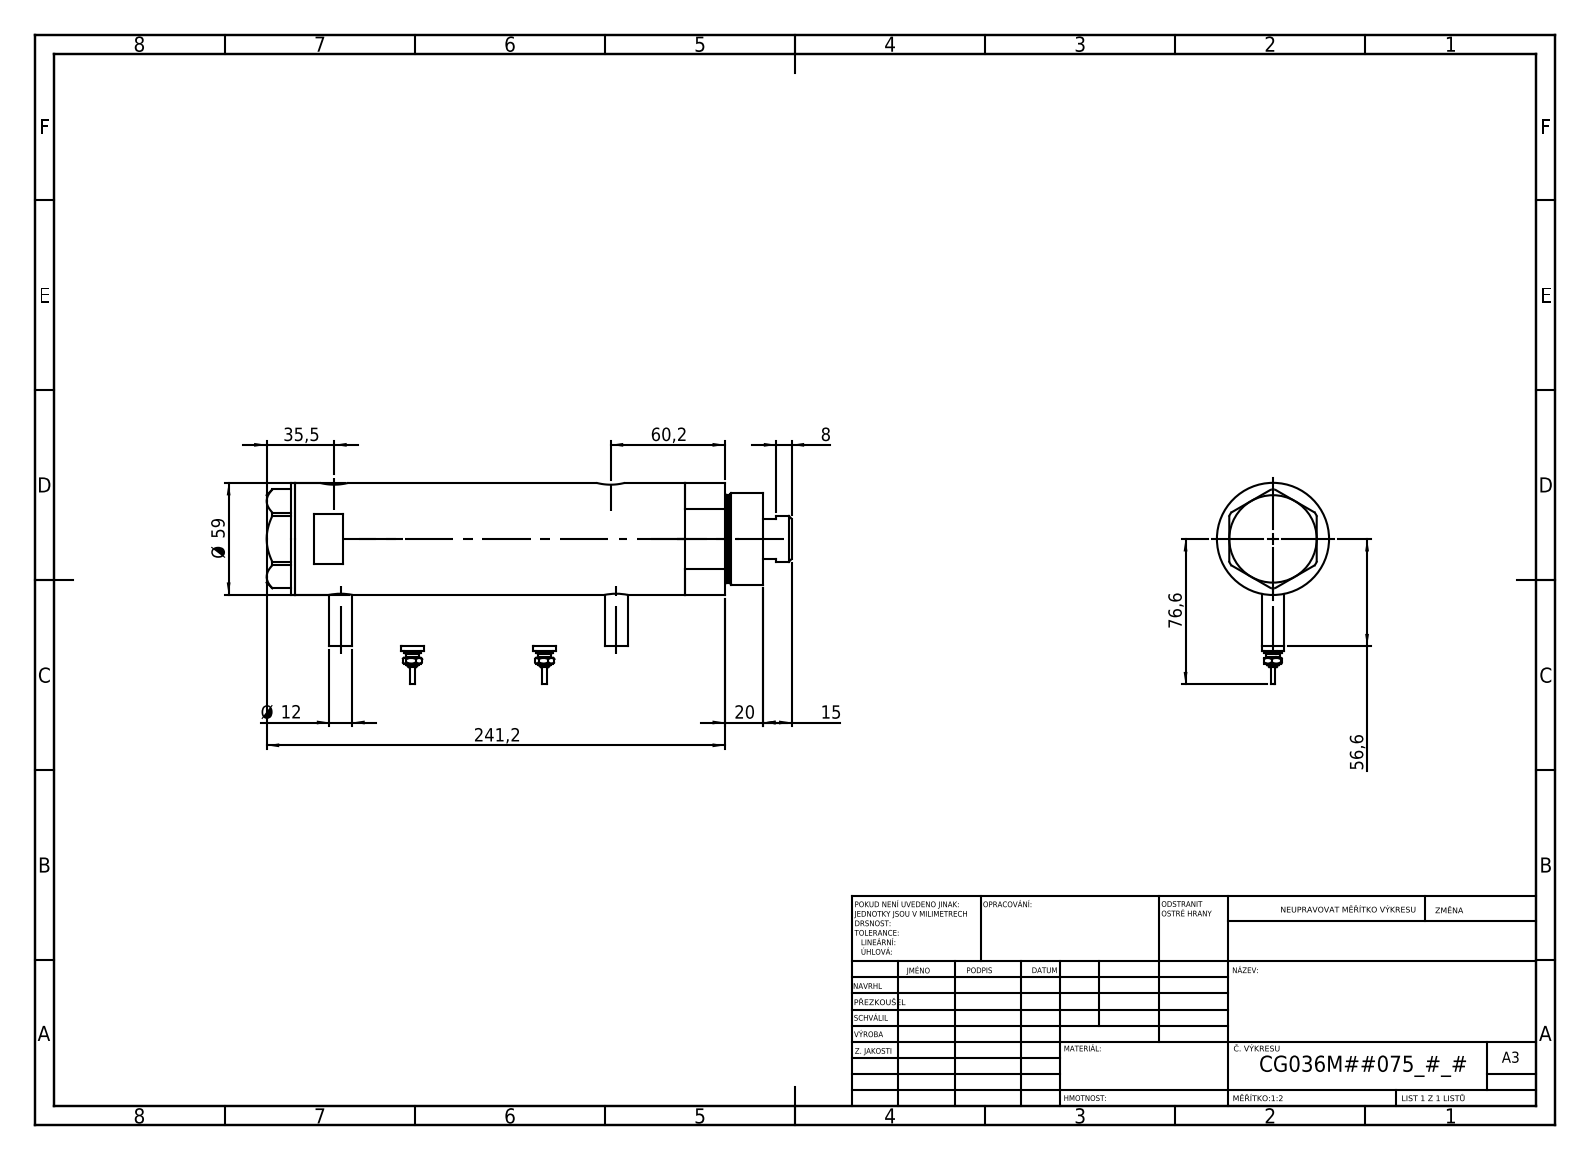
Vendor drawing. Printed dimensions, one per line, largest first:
241,2
76,6
60,2
Ø 59
56,6
35,5
20
15
Ø 12
8
